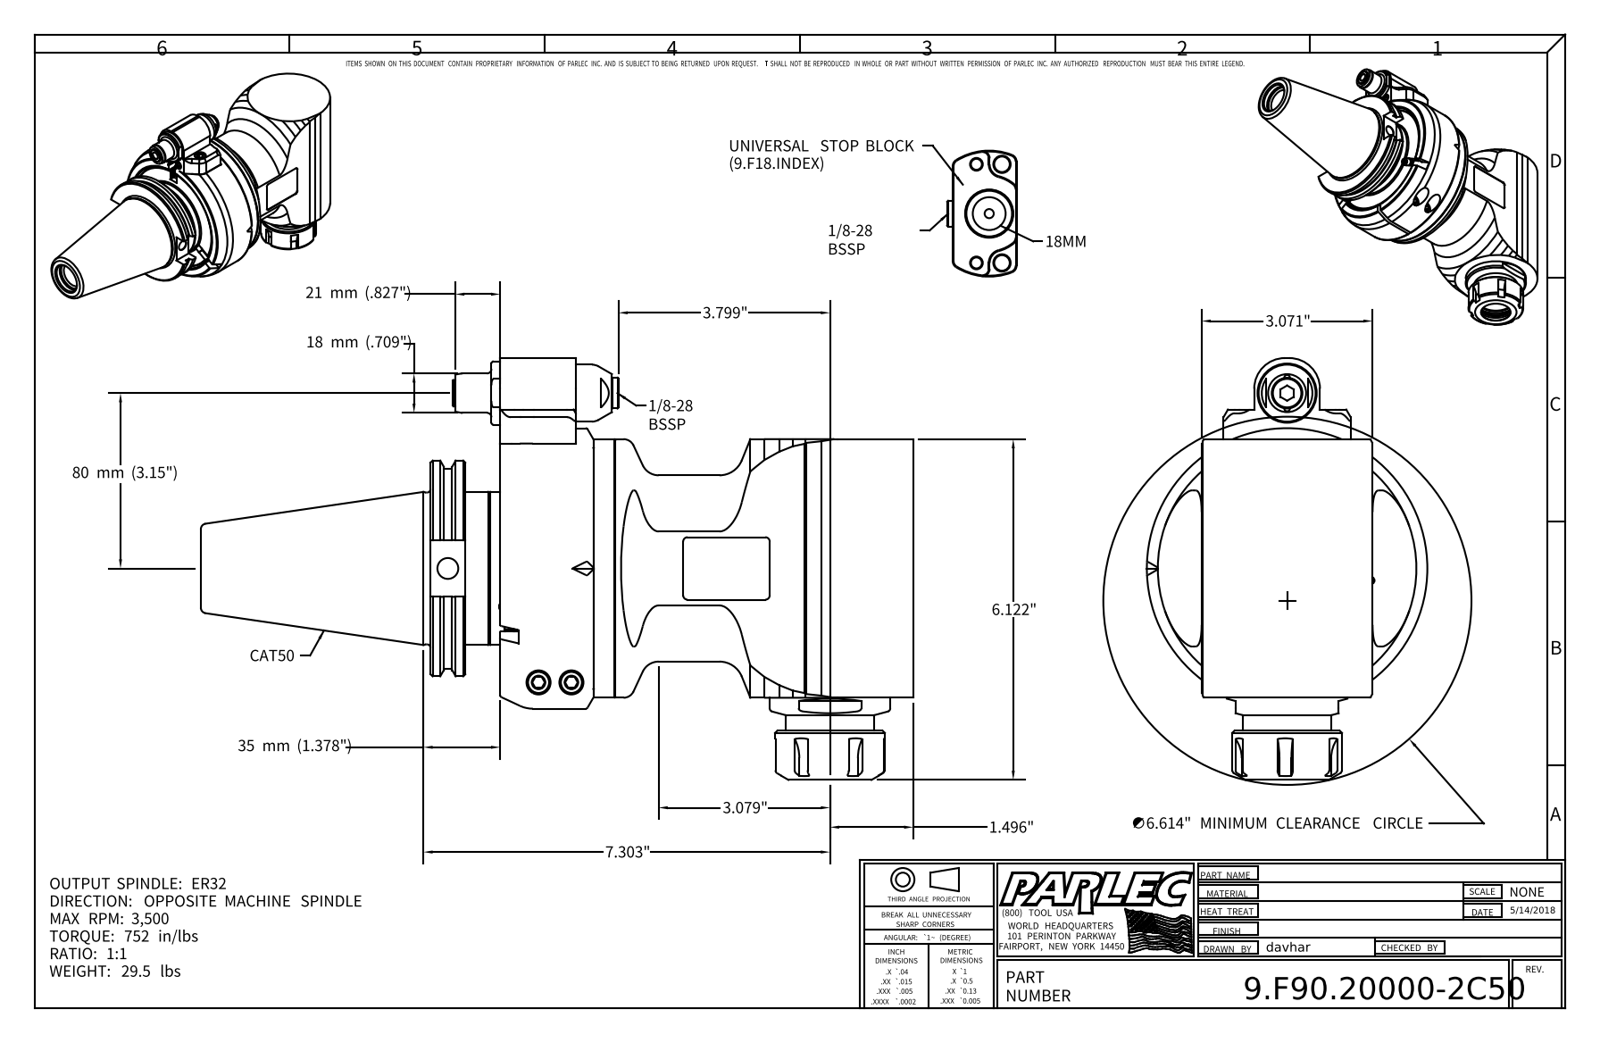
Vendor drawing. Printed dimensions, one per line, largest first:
80 mm (3.15")
35 mm (1.378")
21 mm (.827")
18 mm (.709")
7.303"
∅6.614" MINIMUM CLEARANCE CIRCLE
6.122"
3.799"
3.079"
3.071"
1.496"
